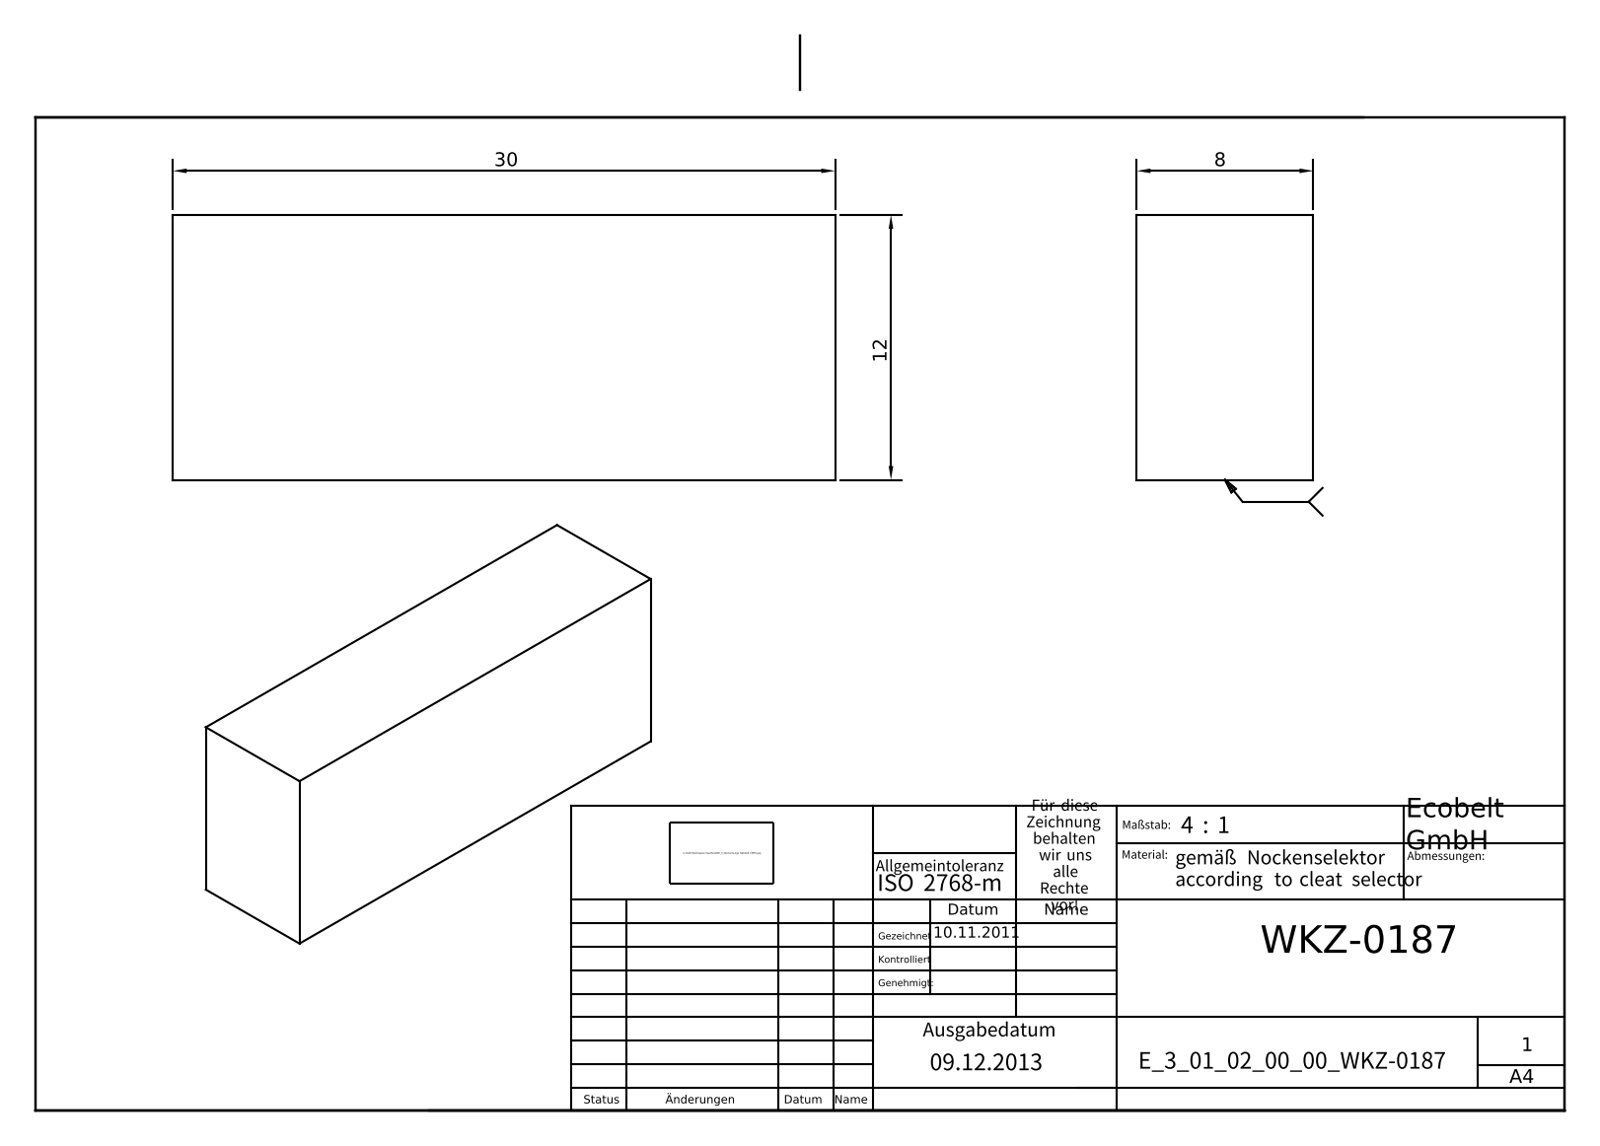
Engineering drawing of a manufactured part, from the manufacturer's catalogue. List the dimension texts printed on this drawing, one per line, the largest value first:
30
12
8
